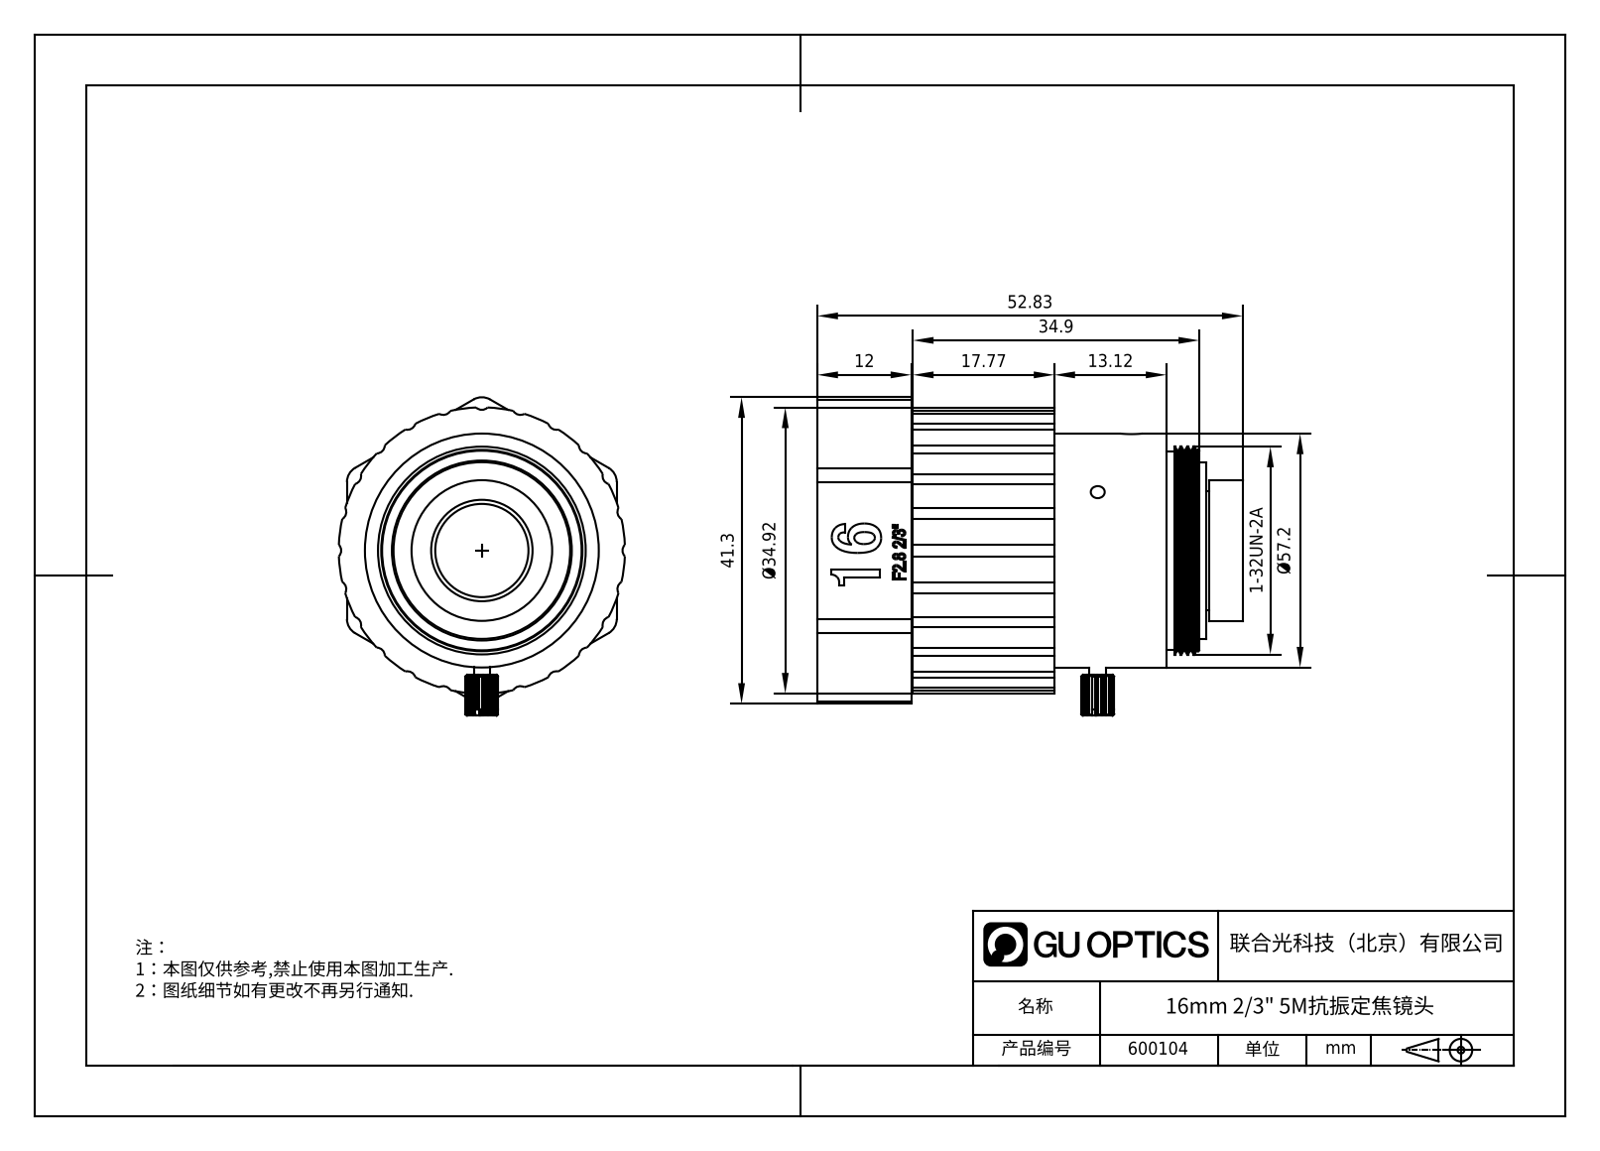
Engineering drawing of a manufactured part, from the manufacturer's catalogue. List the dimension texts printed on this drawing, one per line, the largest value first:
Ø57.2
52.83
41.3
Ø34.92
34.9
17.77
13.12
12
1-32UN-2A
